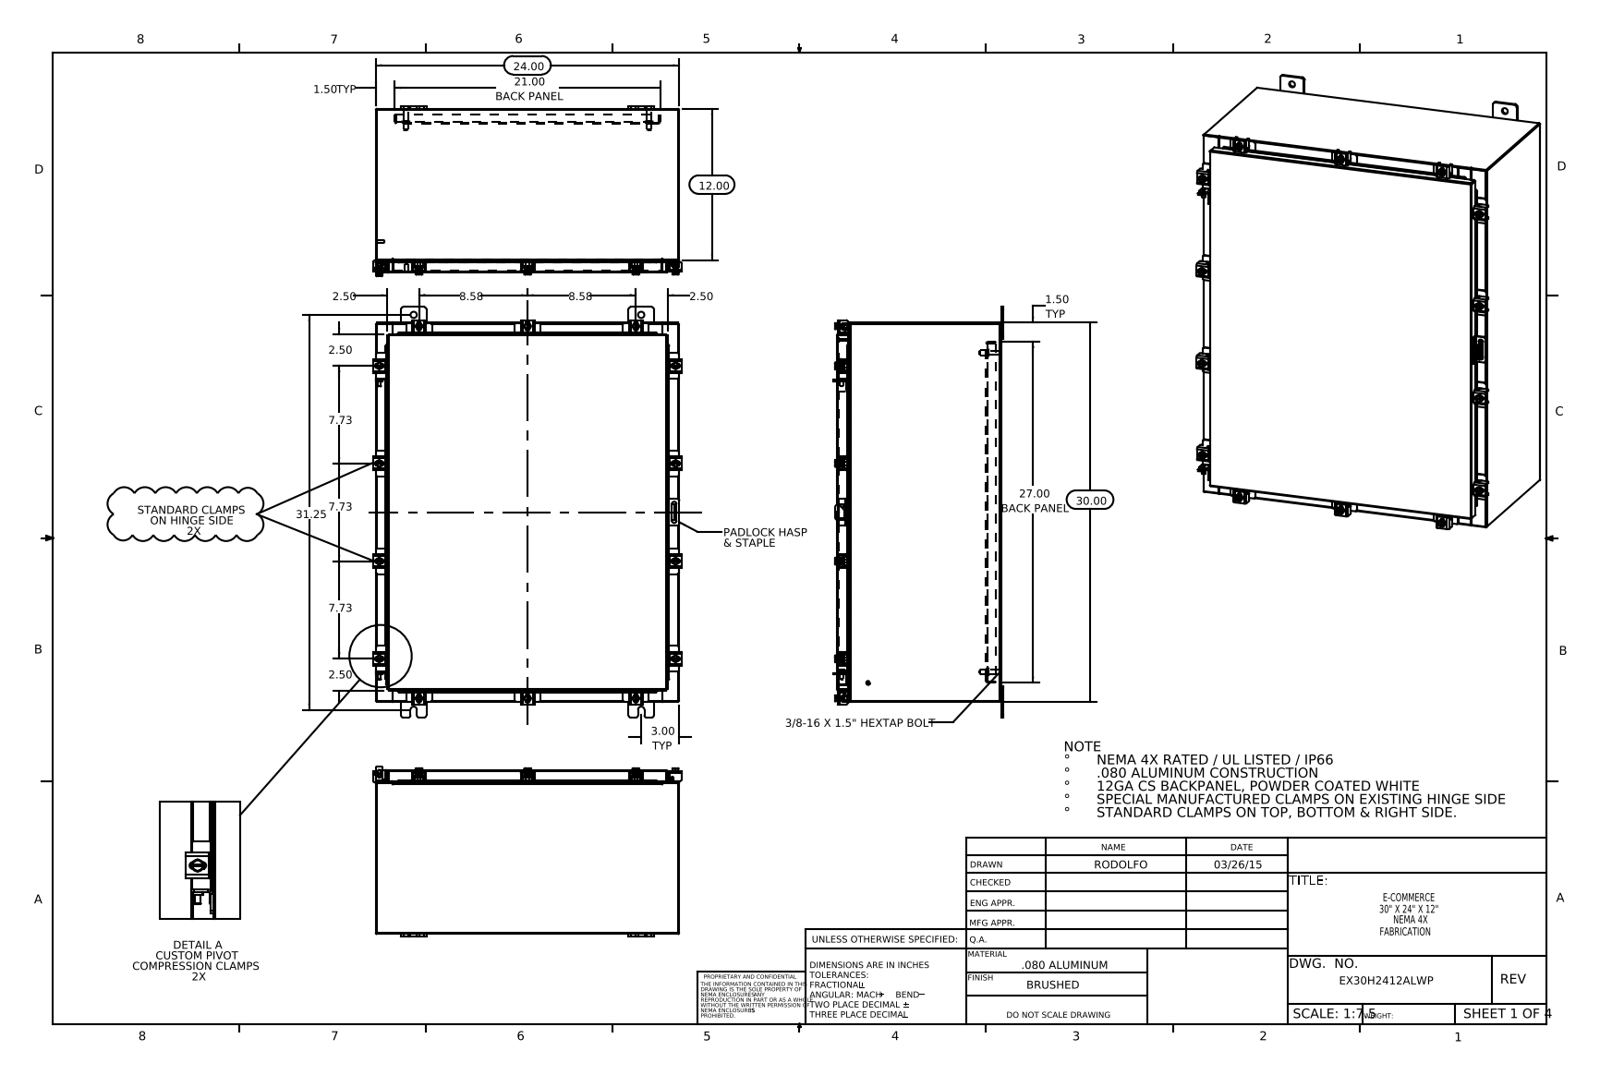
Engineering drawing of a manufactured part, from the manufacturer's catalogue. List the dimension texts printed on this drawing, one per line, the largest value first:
31.25
30.00
27.00 BACK PANEL
24.00
21.00 BACK PANEL
12.00
8.58
8.58
7.73
7.73
7.73
3.00 TYP
2.50
2.50
2.50
2.50
1.50 TYP
1.50 TYP
